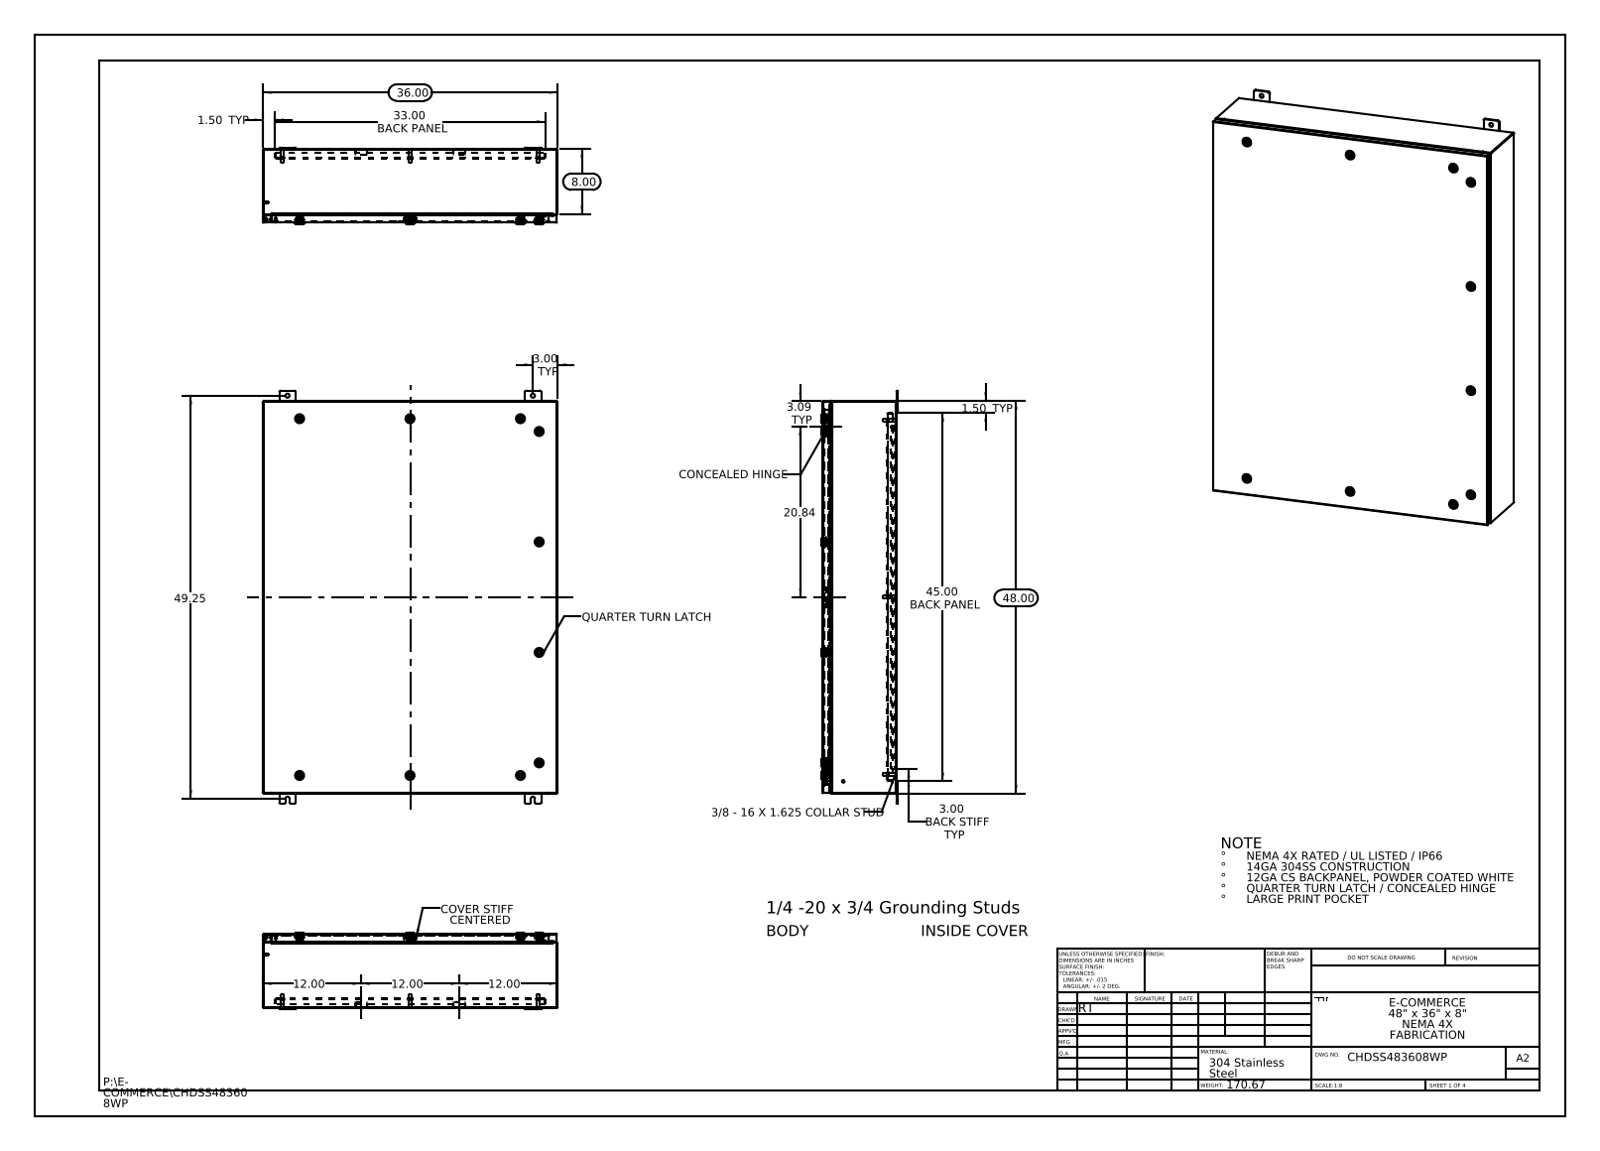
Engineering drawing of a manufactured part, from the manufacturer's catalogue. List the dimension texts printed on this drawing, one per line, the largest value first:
49.25
48.00
45.00 BACK PANEL
36.00
33.00 BACK PANEL
20.84
12.00
12.00
12.00
8.00
3.09 TYP
3.00 TYP
3.00 BACK STIFF TYP
1.50 TYP
1.50 TYP
